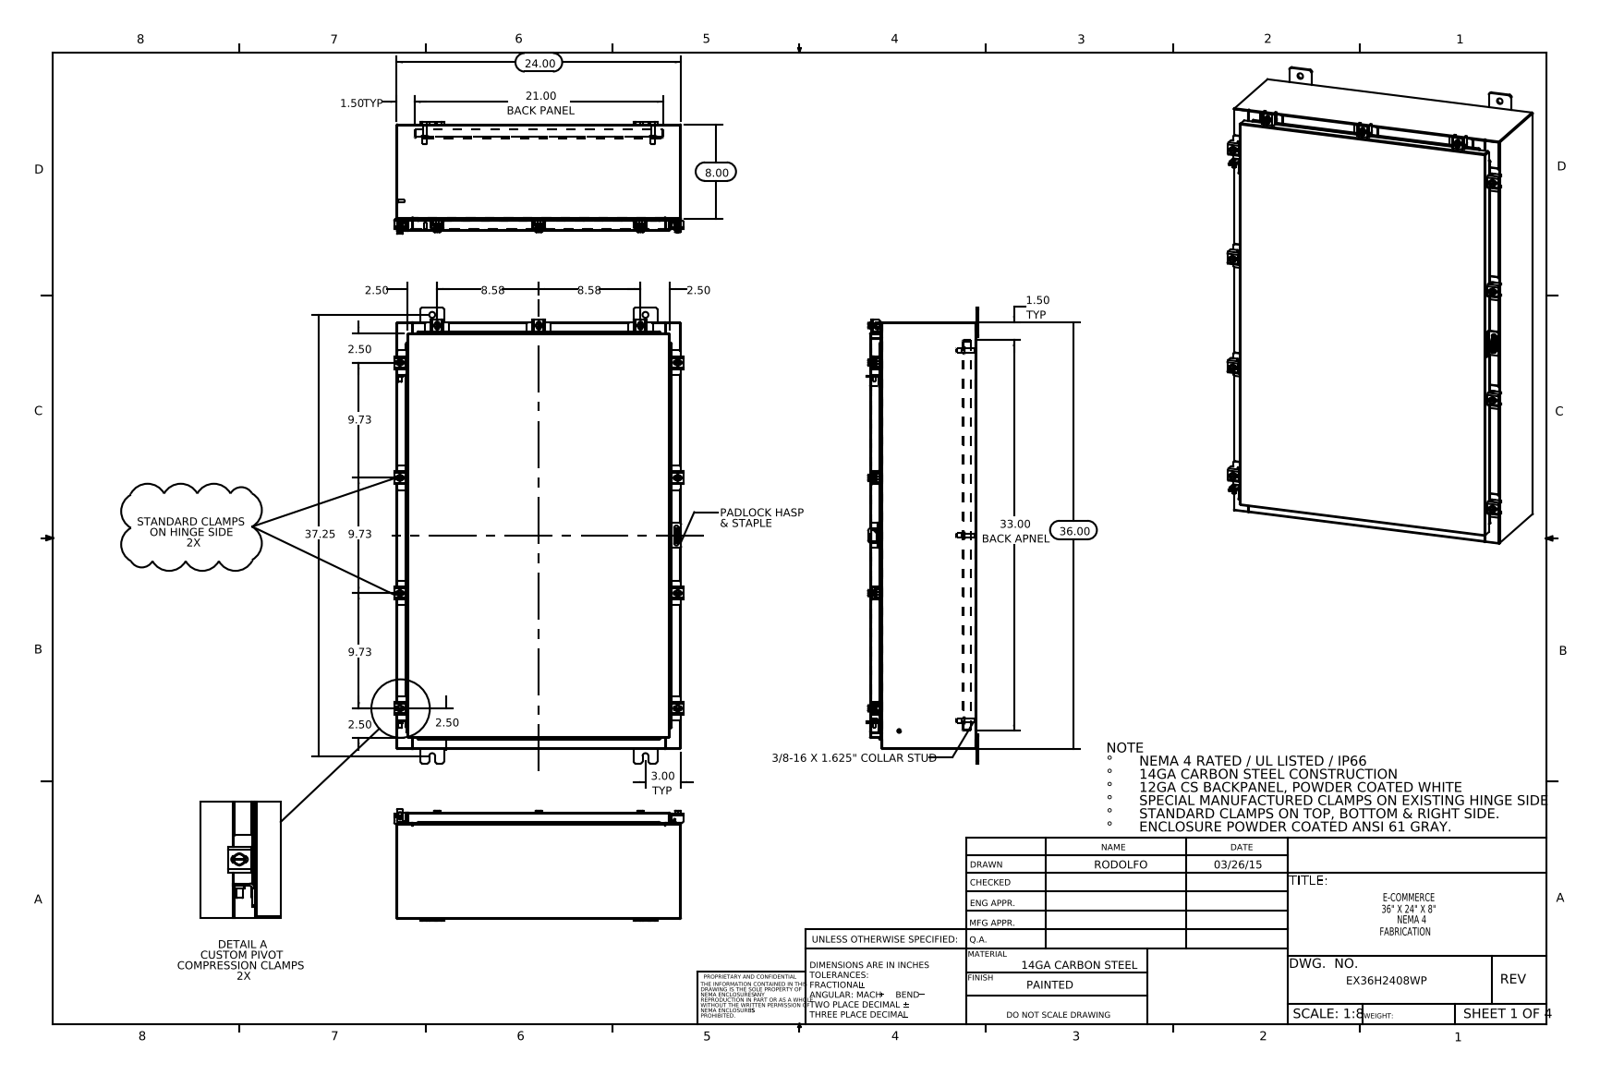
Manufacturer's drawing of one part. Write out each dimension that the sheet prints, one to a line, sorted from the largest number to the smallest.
37.25
36.00
33.00 BACK APNEL
24.00
21.00 BACK PANEL
9.73
9.73
9.73
8.58
8.58
8.00
3.00 TYP
2.50
2.50
2.50
2.50
2.50
1.50 TYP
1.50 TYP
